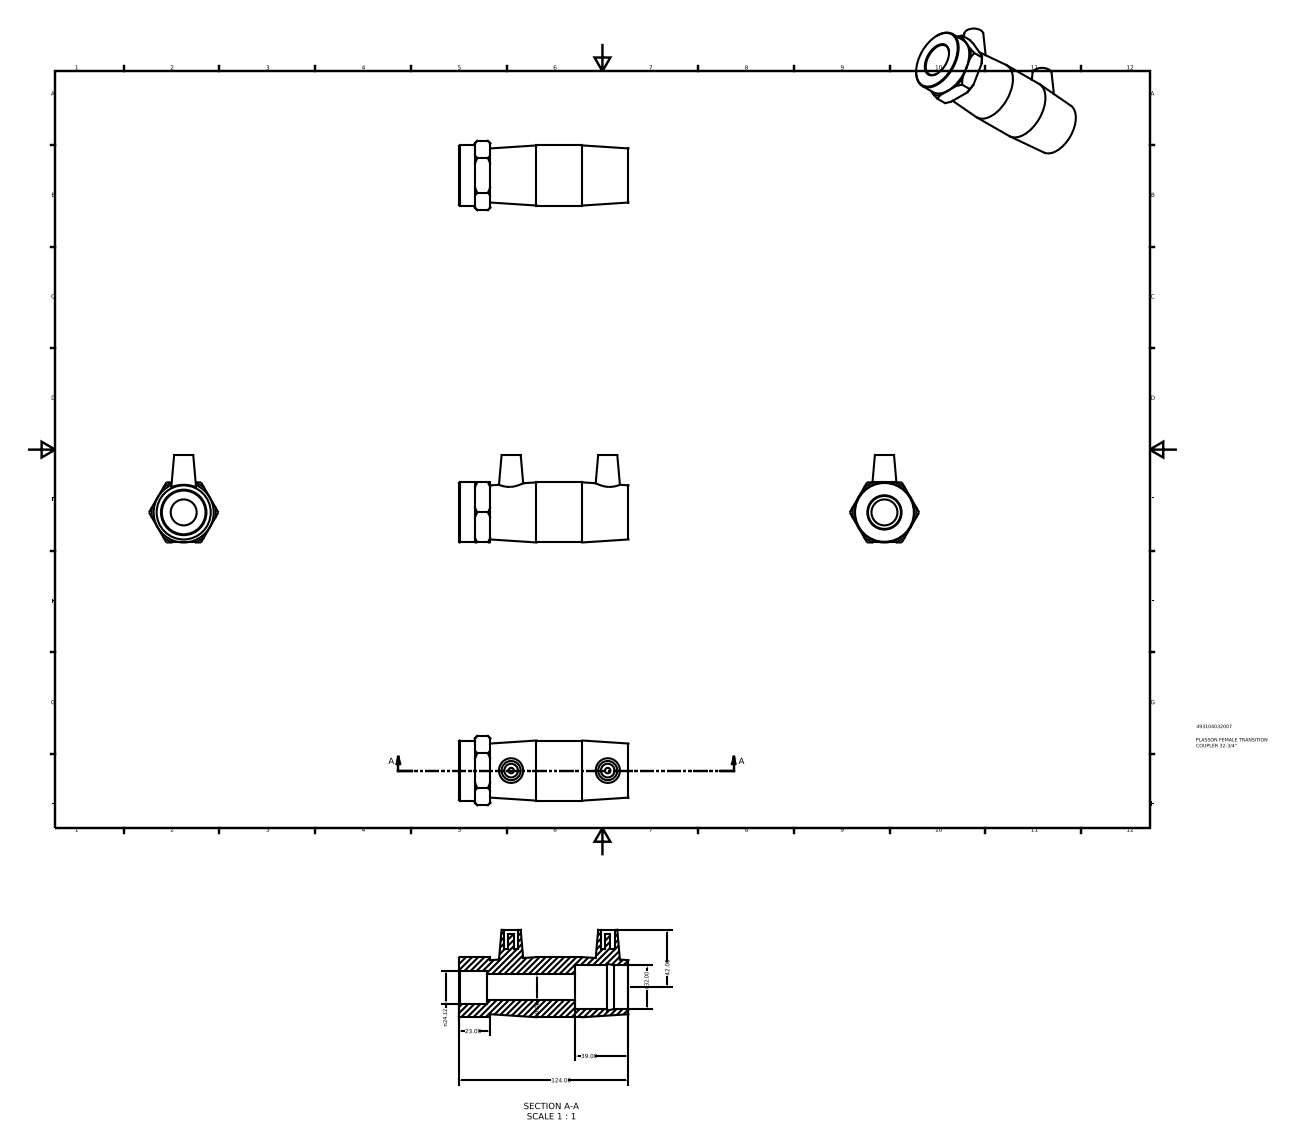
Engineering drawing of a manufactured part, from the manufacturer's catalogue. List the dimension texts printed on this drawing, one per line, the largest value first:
124.00
42.00
39.00
n32.00
n24.12
23.00
19.00
